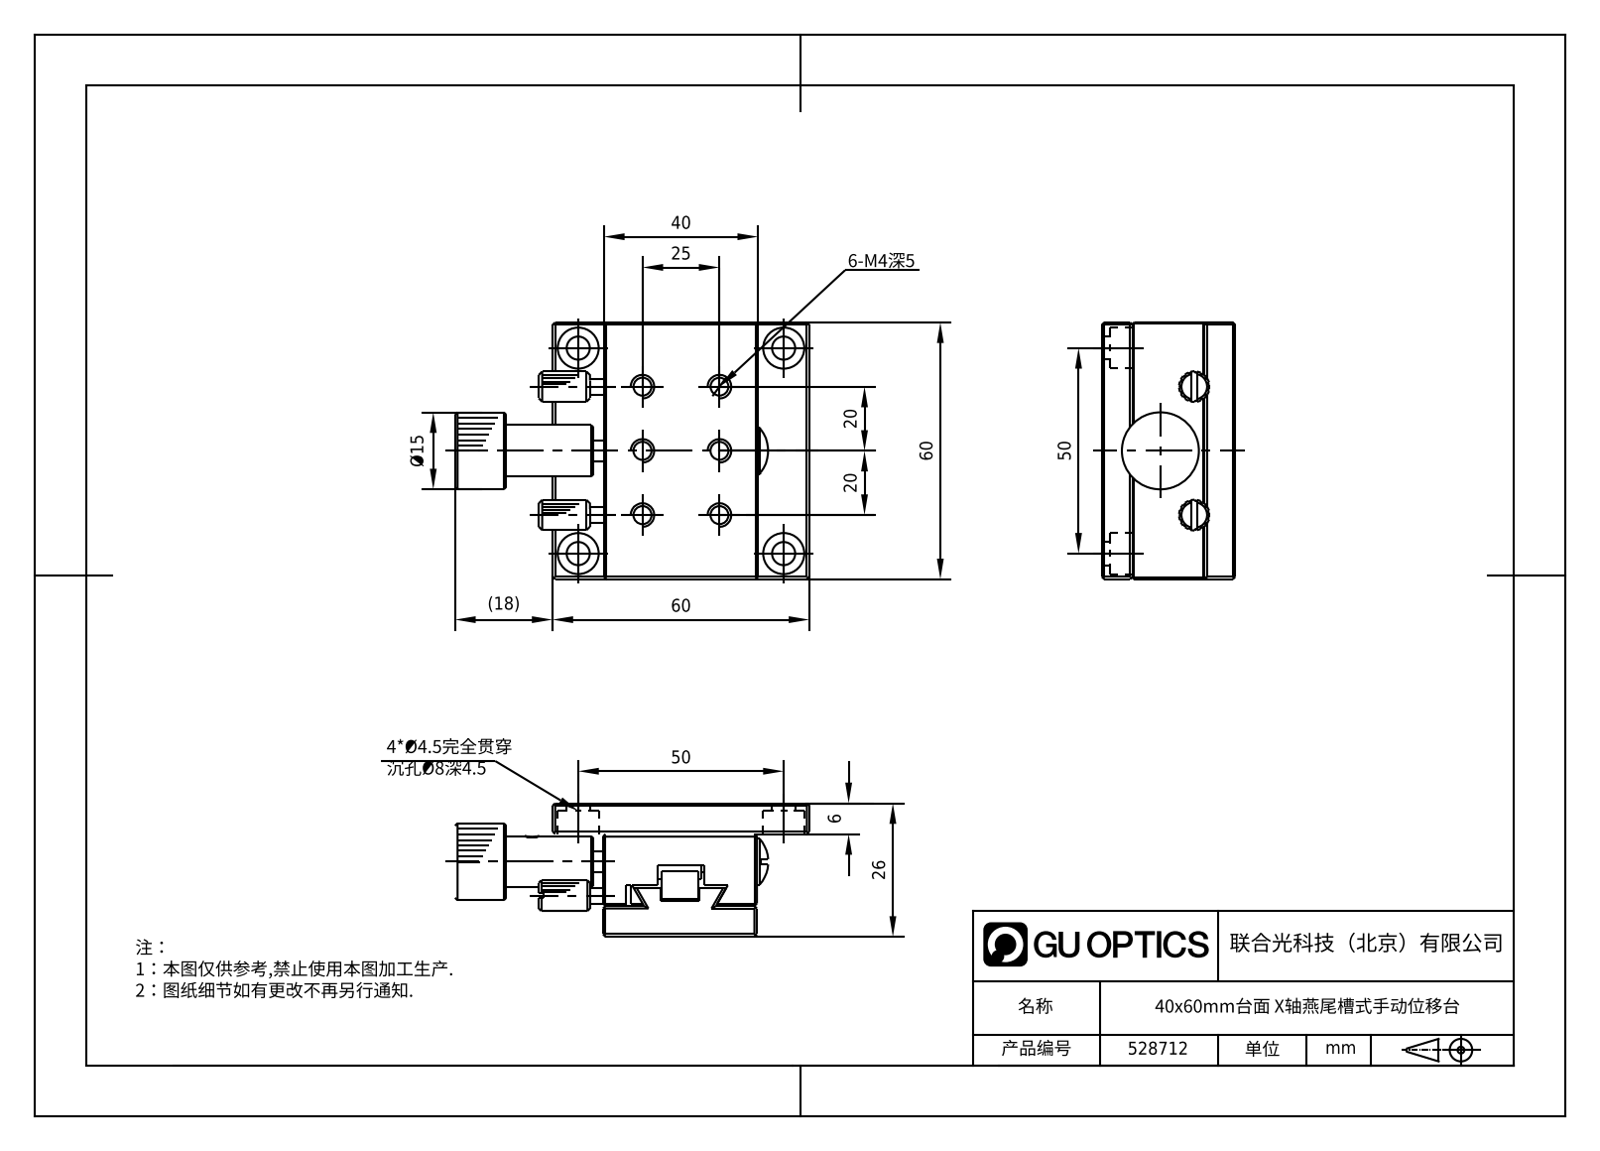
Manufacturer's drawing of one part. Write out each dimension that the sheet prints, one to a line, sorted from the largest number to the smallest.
60
60
50
50
40
26
25
20
20
(18)
Ø15
6
